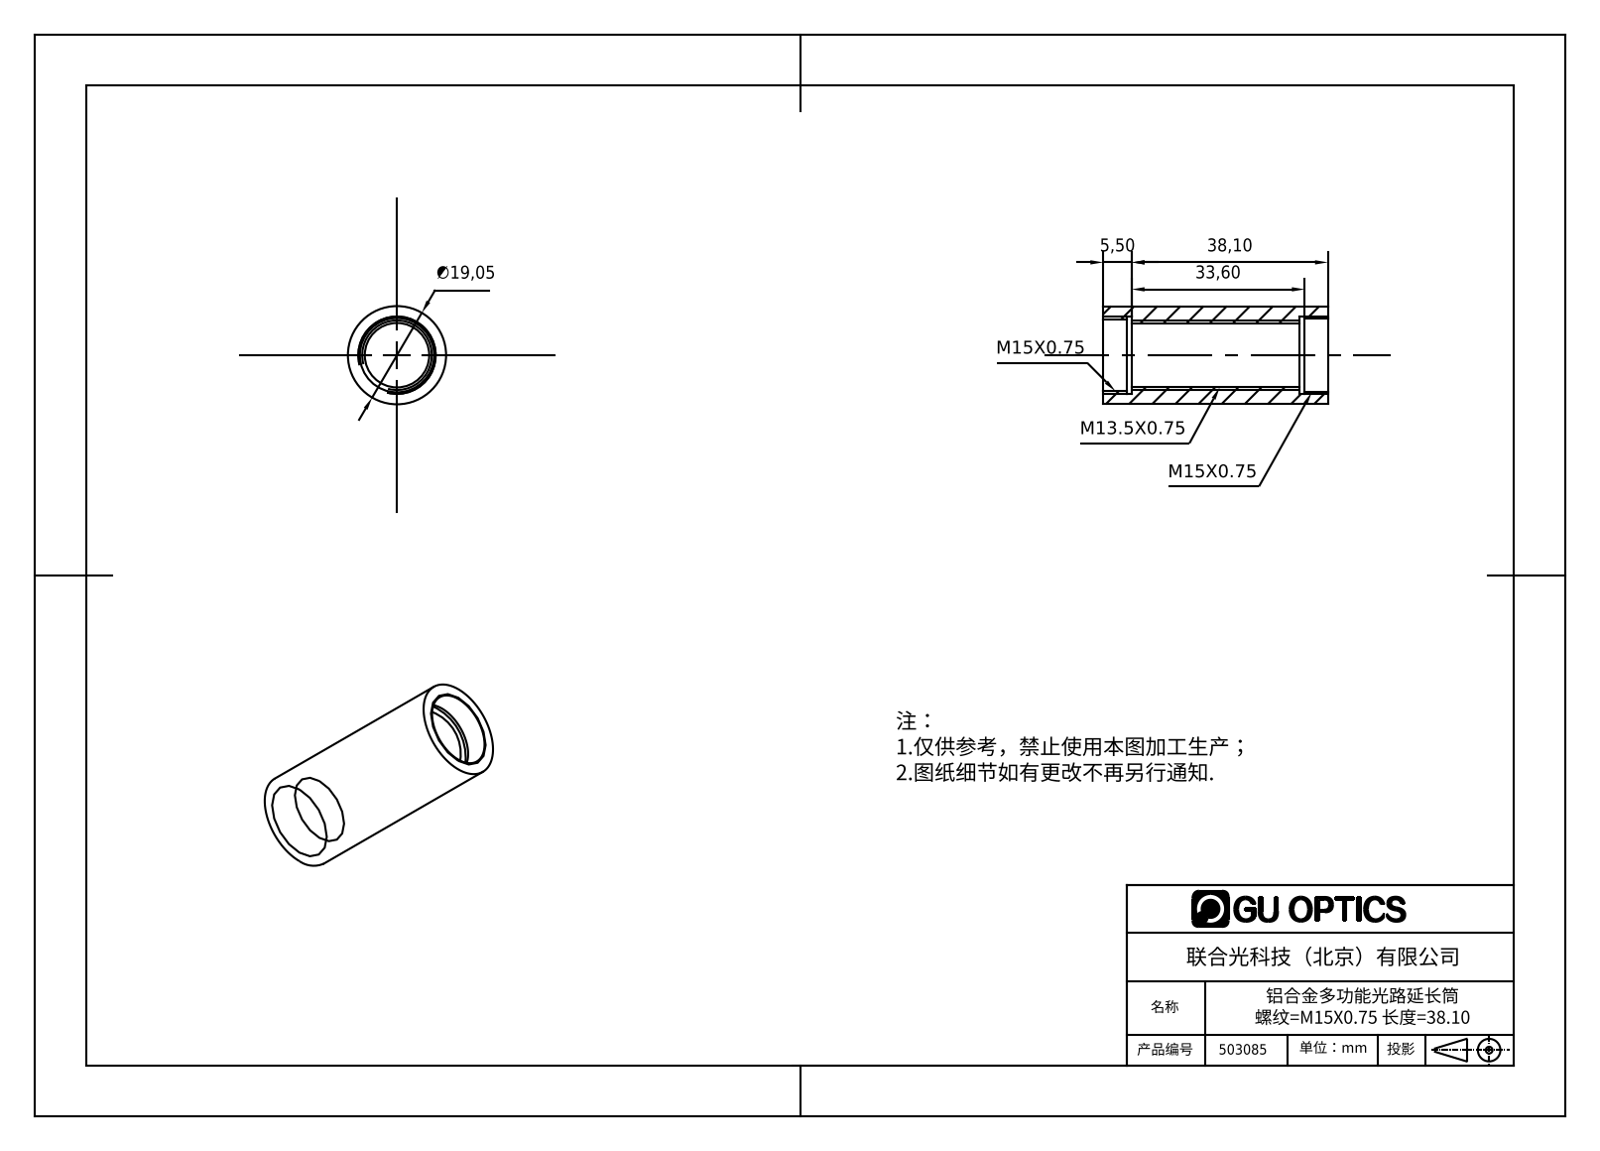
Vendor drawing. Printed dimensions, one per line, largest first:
38,10
33,60
∅19,05
5,50
